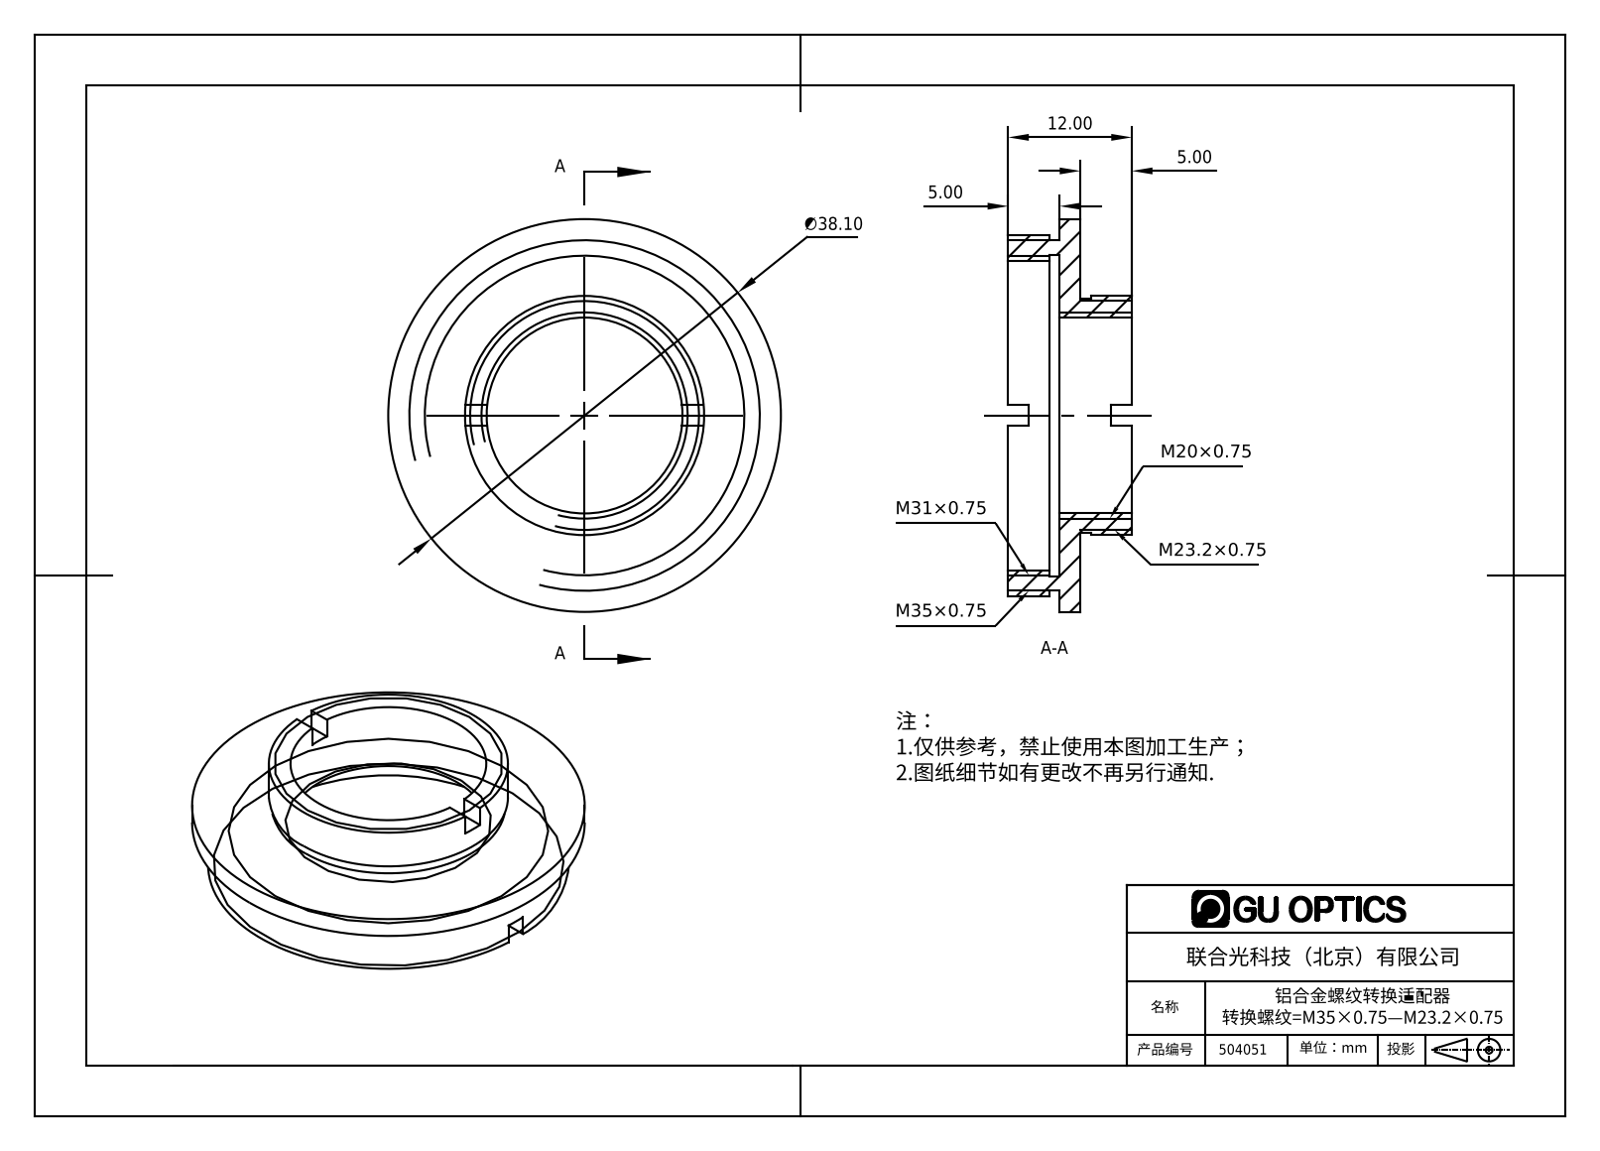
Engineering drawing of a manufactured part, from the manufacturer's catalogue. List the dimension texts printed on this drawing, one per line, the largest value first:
∅38.10
12.00
5.00
5.00
